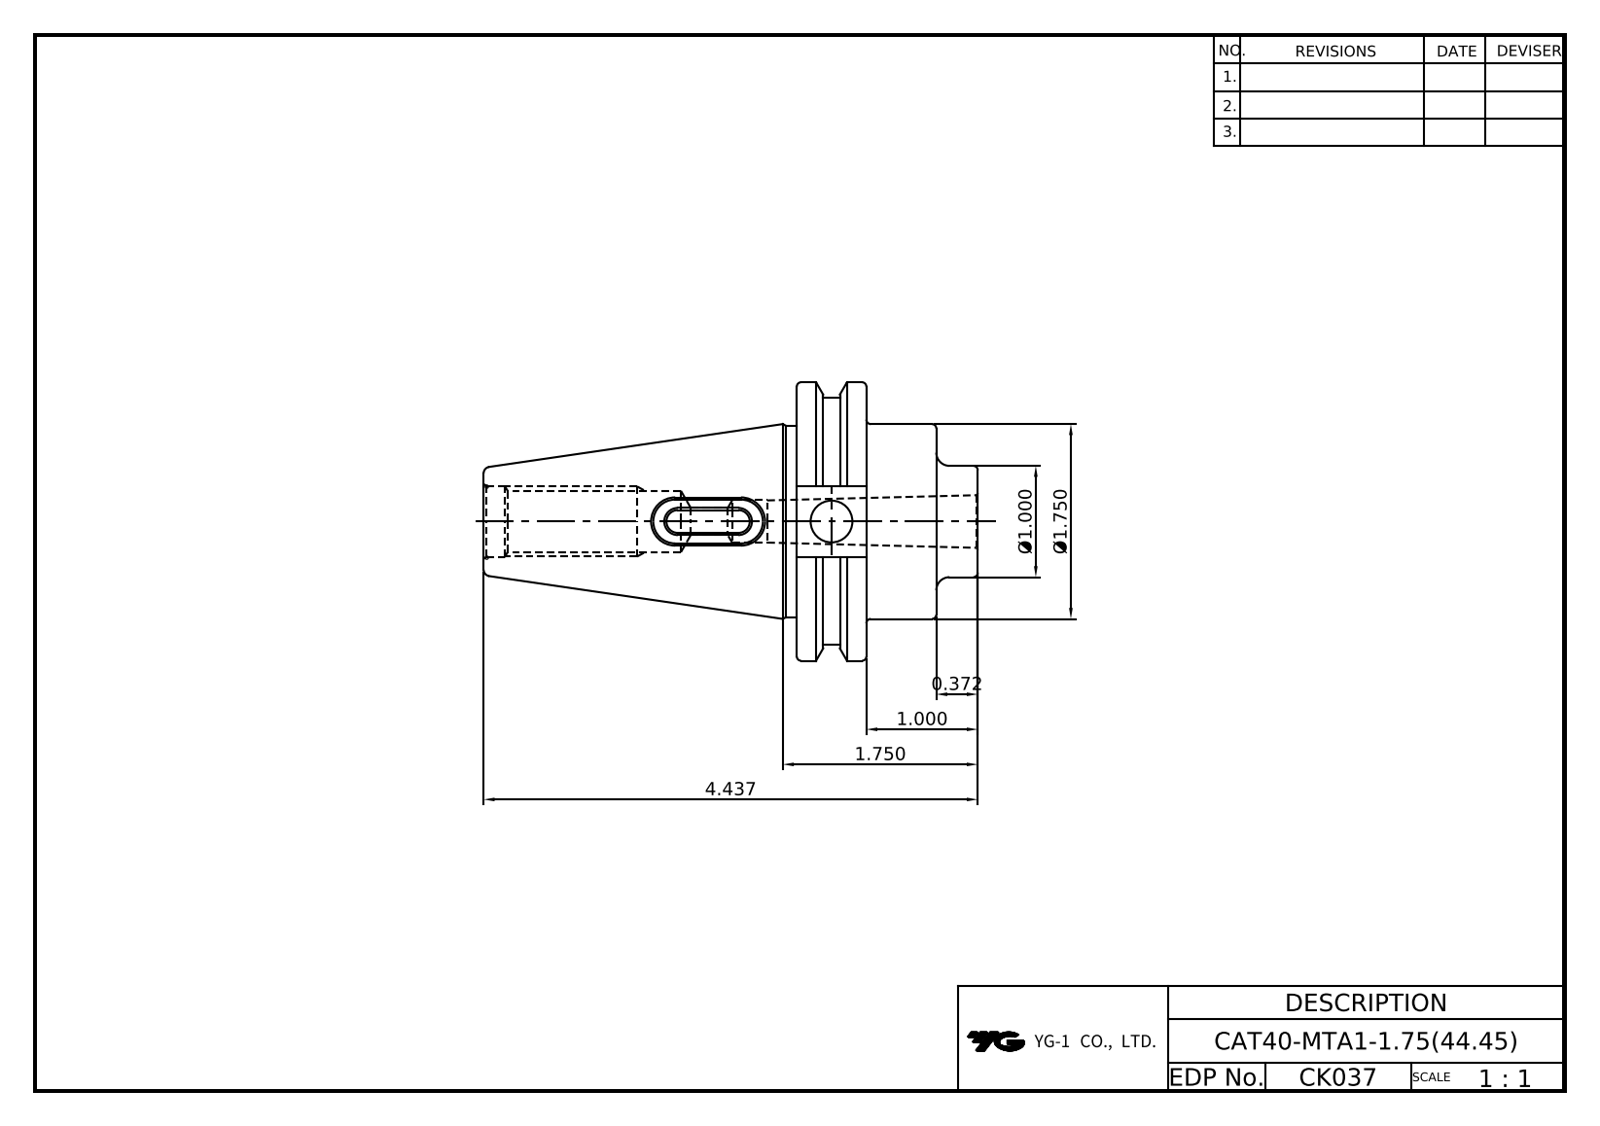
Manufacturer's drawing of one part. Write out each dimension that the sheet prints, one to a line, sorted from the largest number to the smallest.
4.437
1.750
Ø1.750
Ø1.000
1.000
0.372
